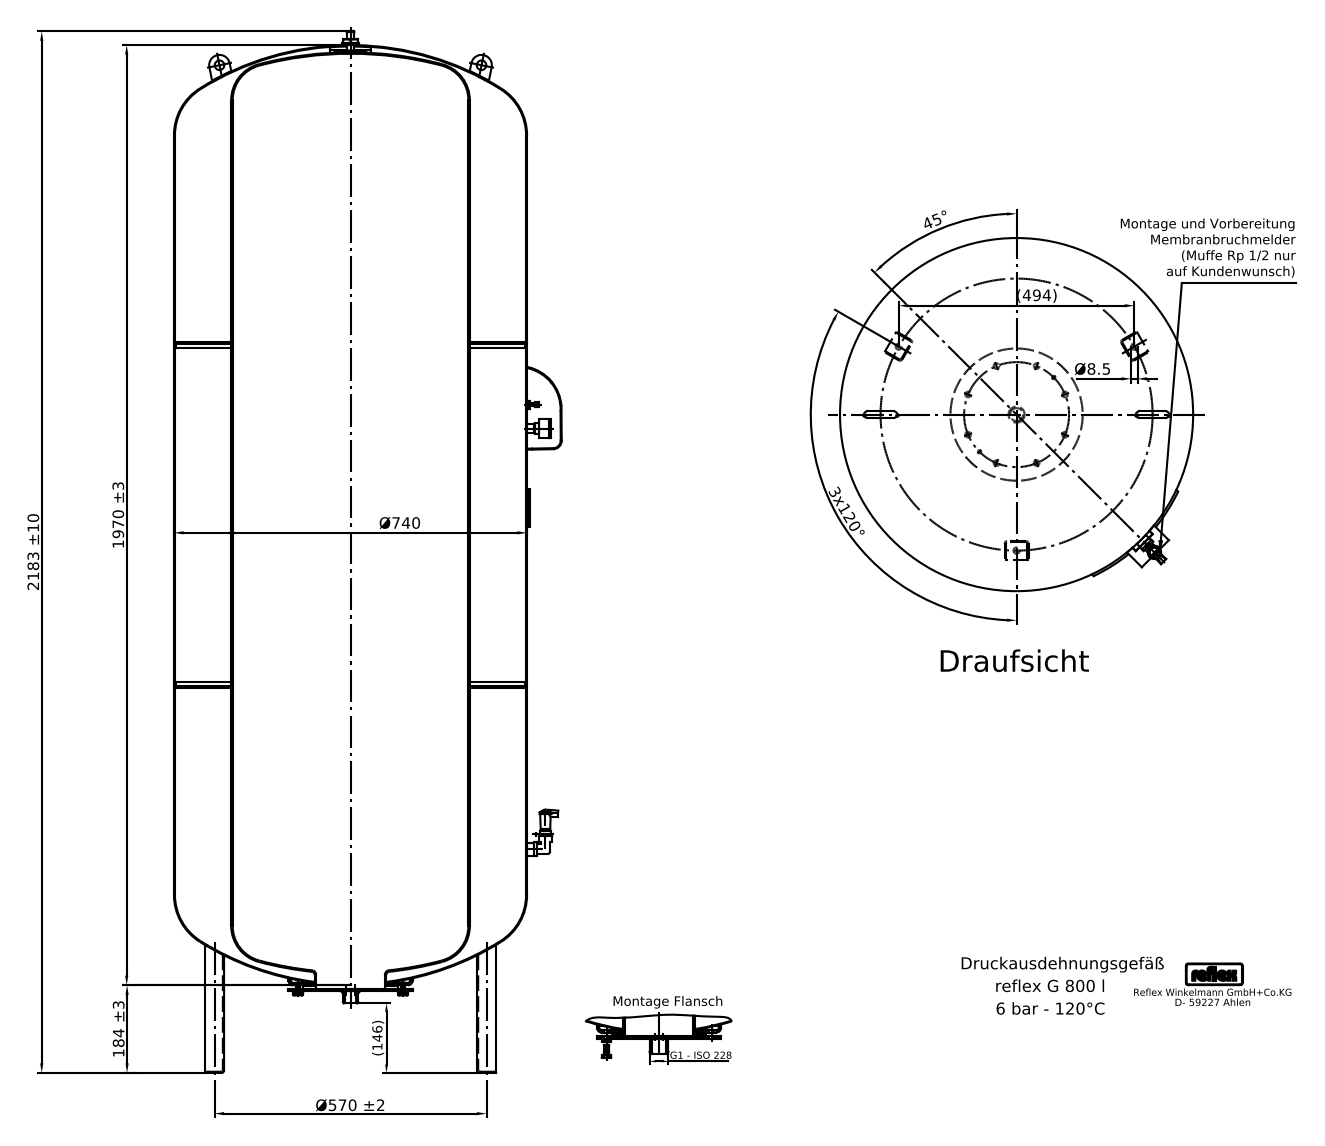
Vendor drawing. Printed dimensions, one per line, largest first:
2183 ±10
1970 ±3
Ø740
Ø570 ±2
(494)
184 ±3
(146)
3x120°
45°
Ø8.5
G1 - ISO 228
